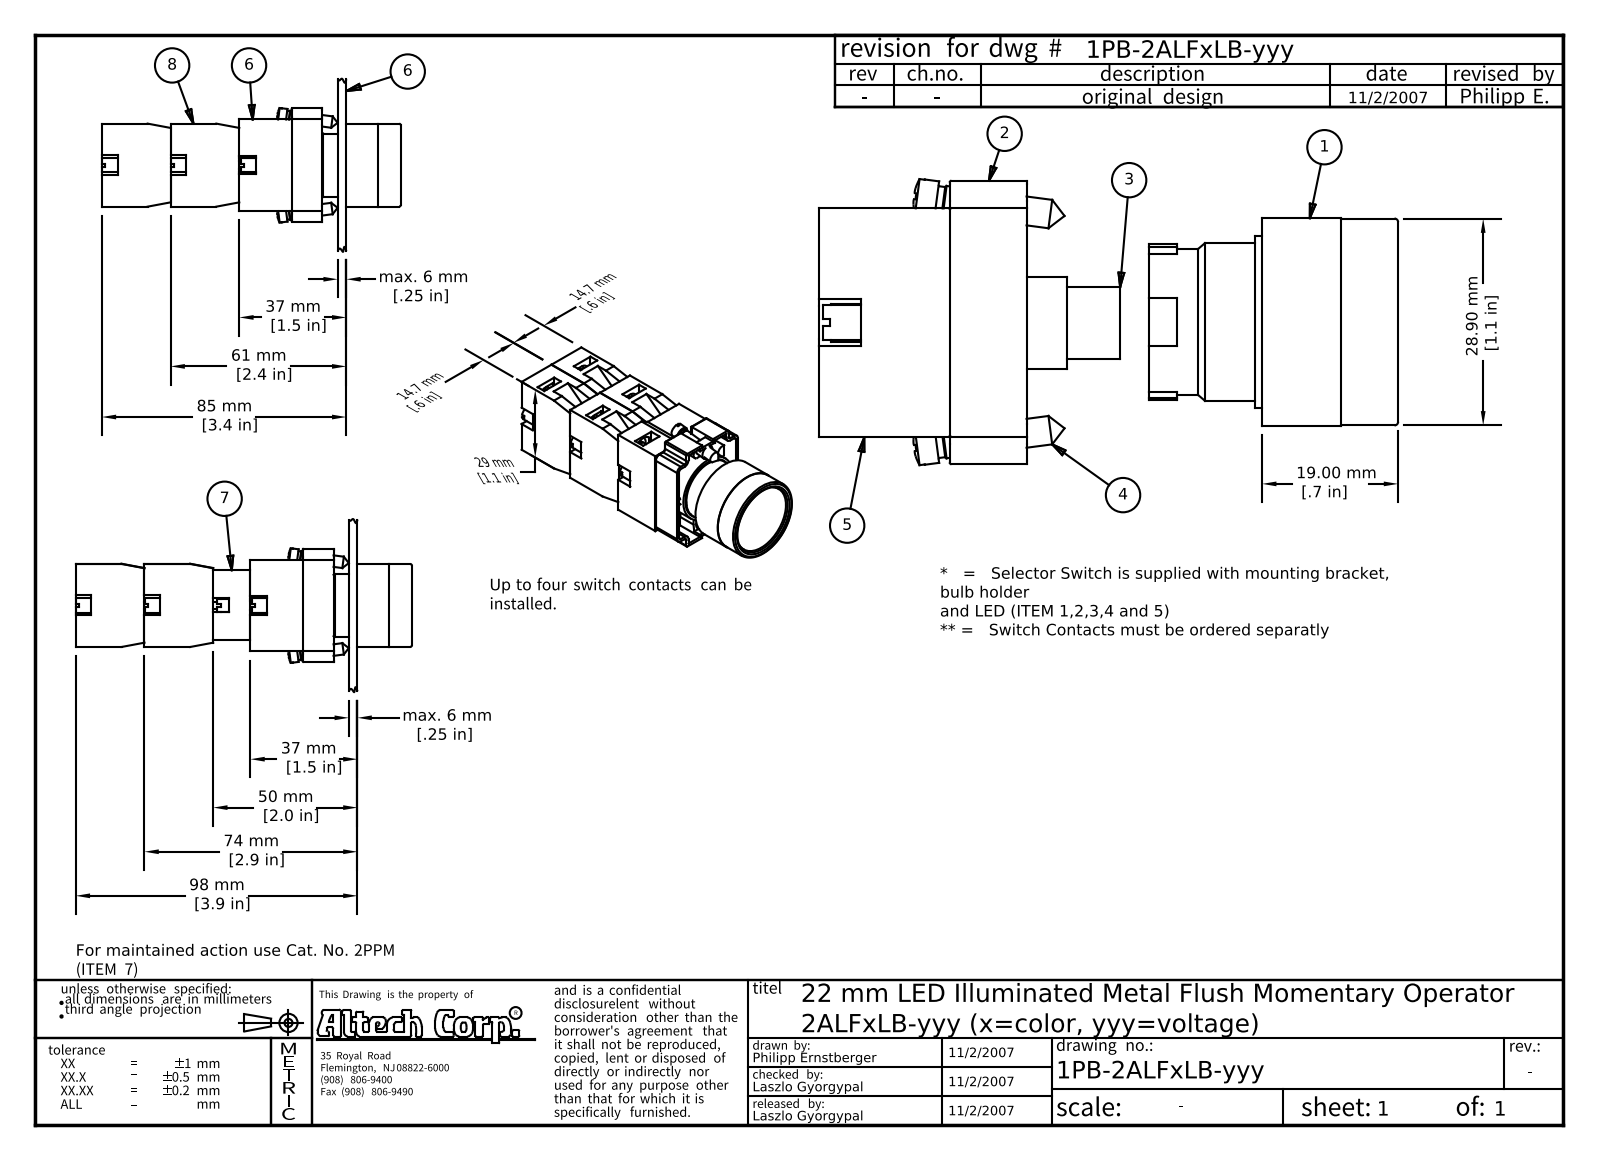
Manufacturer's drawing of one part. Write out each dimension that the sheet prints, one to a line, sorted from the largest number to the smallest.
98 mm [3.9 in]
85 mm [3.4 in]
74 mm [2.9 in]
61 mm [2.4 in]
50 mm [2.0 in]
37 mm [1.5 in]
37 mm [1.5 in]
29 mm [1.1 in]
28.90 mm [1.1 in]
19.00 mm [.7 in]
14.7 mm [.6 in]
14.7 mm [.6 in]
max. 6 mm [.25 in]
max. 6 mm [.25 in]
